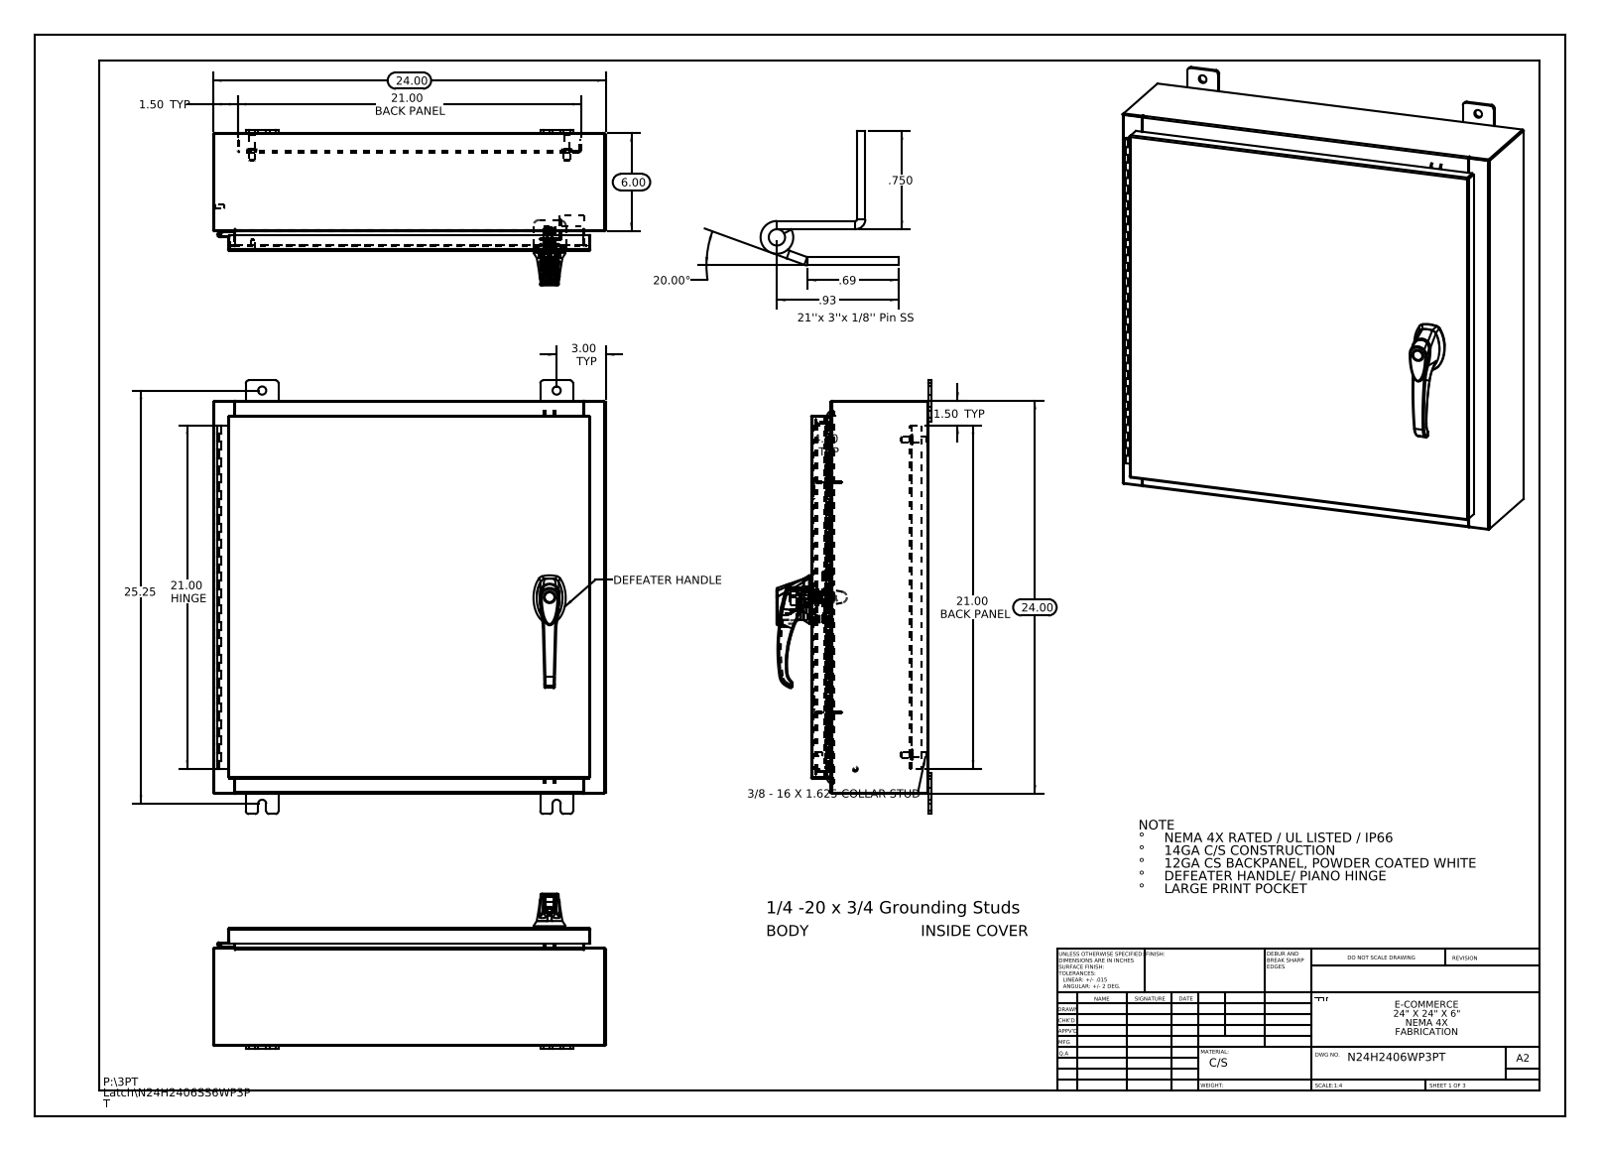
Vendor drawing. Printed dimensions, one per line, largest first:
25.25
24.00
24.00
21.00 HINGE
21.00 BACK PANEL
21.00 BACK PANEL
20.00°
6.00
4.00 TYP
3.00 TYP
1.50 TYP
1.50 TYP
.93
.750
.69
